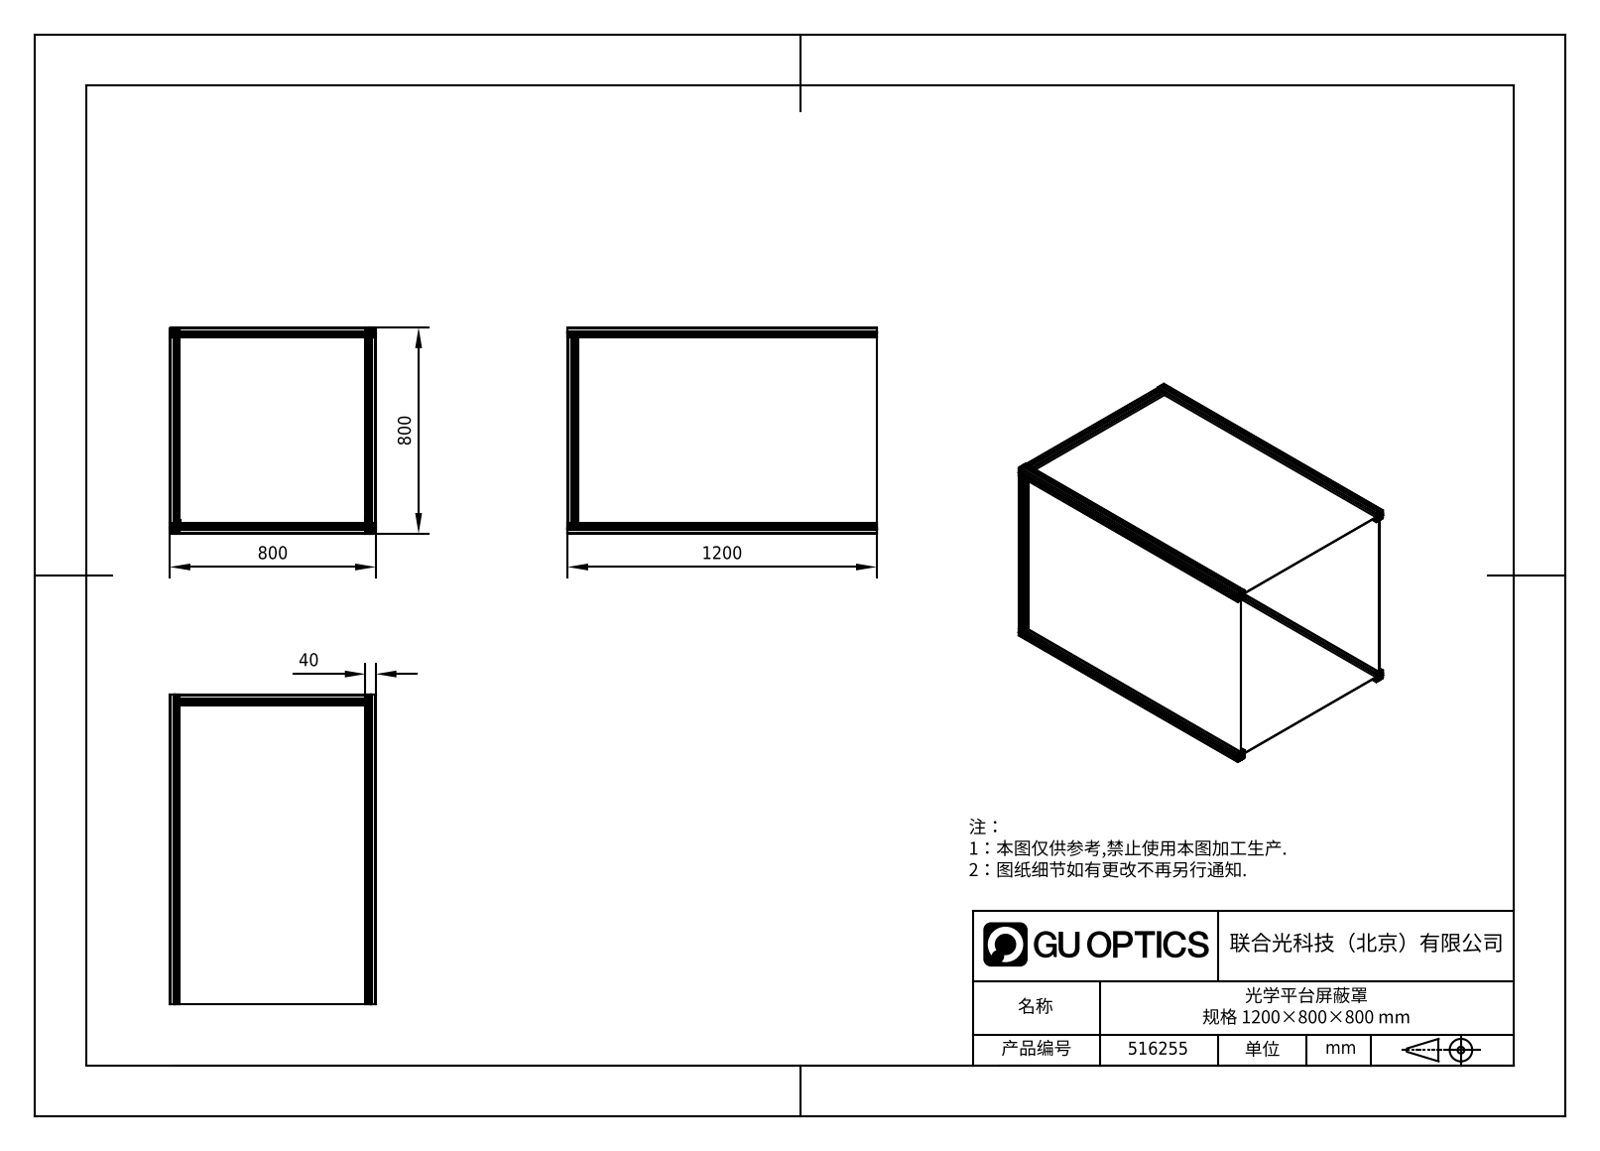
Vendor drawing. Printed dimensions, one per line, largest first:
1200
800
800
40
